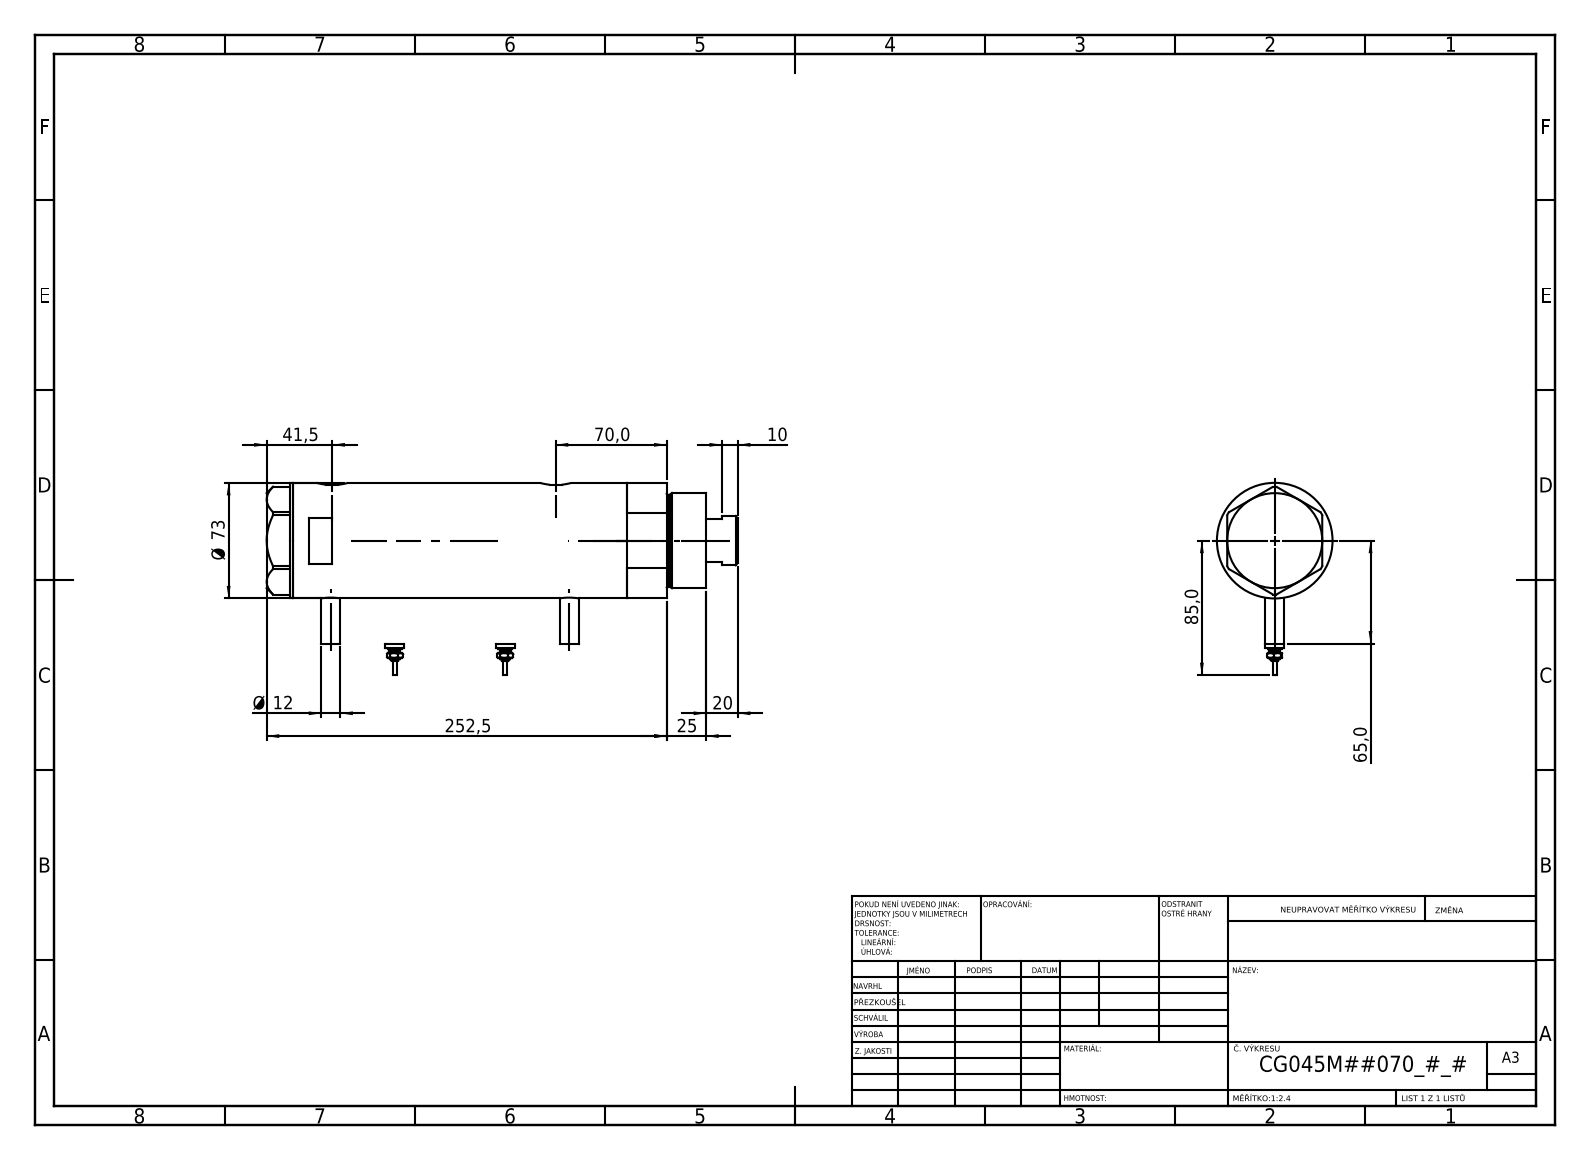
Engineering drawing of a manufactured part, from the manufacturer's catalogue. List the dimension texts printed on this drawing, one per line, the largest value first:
252,5
85,0
Ø 73
70,0
65,0
41,5
25
20
Ø 12
10
